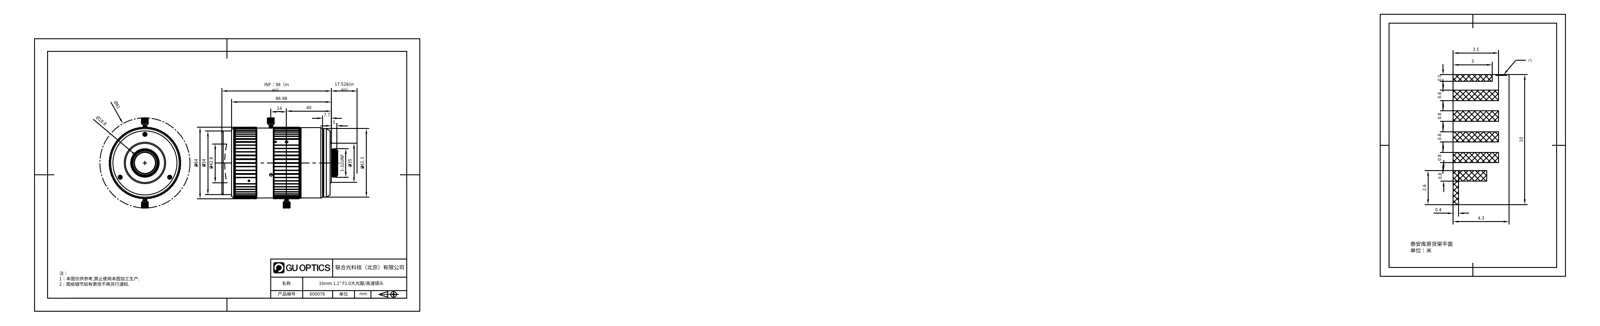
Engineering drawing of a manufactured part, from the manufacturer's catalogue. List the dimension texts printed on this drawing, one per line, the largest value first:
INF：98（in air）
86.98
Ø81
Ø64
Ø61.3
Ø54
Ø42.8
40
Ø35
Ø18.8
17.526(in air)
14
10
7.7
5
4.3
3.5
3
2.6
1-32UNF
0.8
0.8
0.8
0.8
0.8
0.5
0.4
